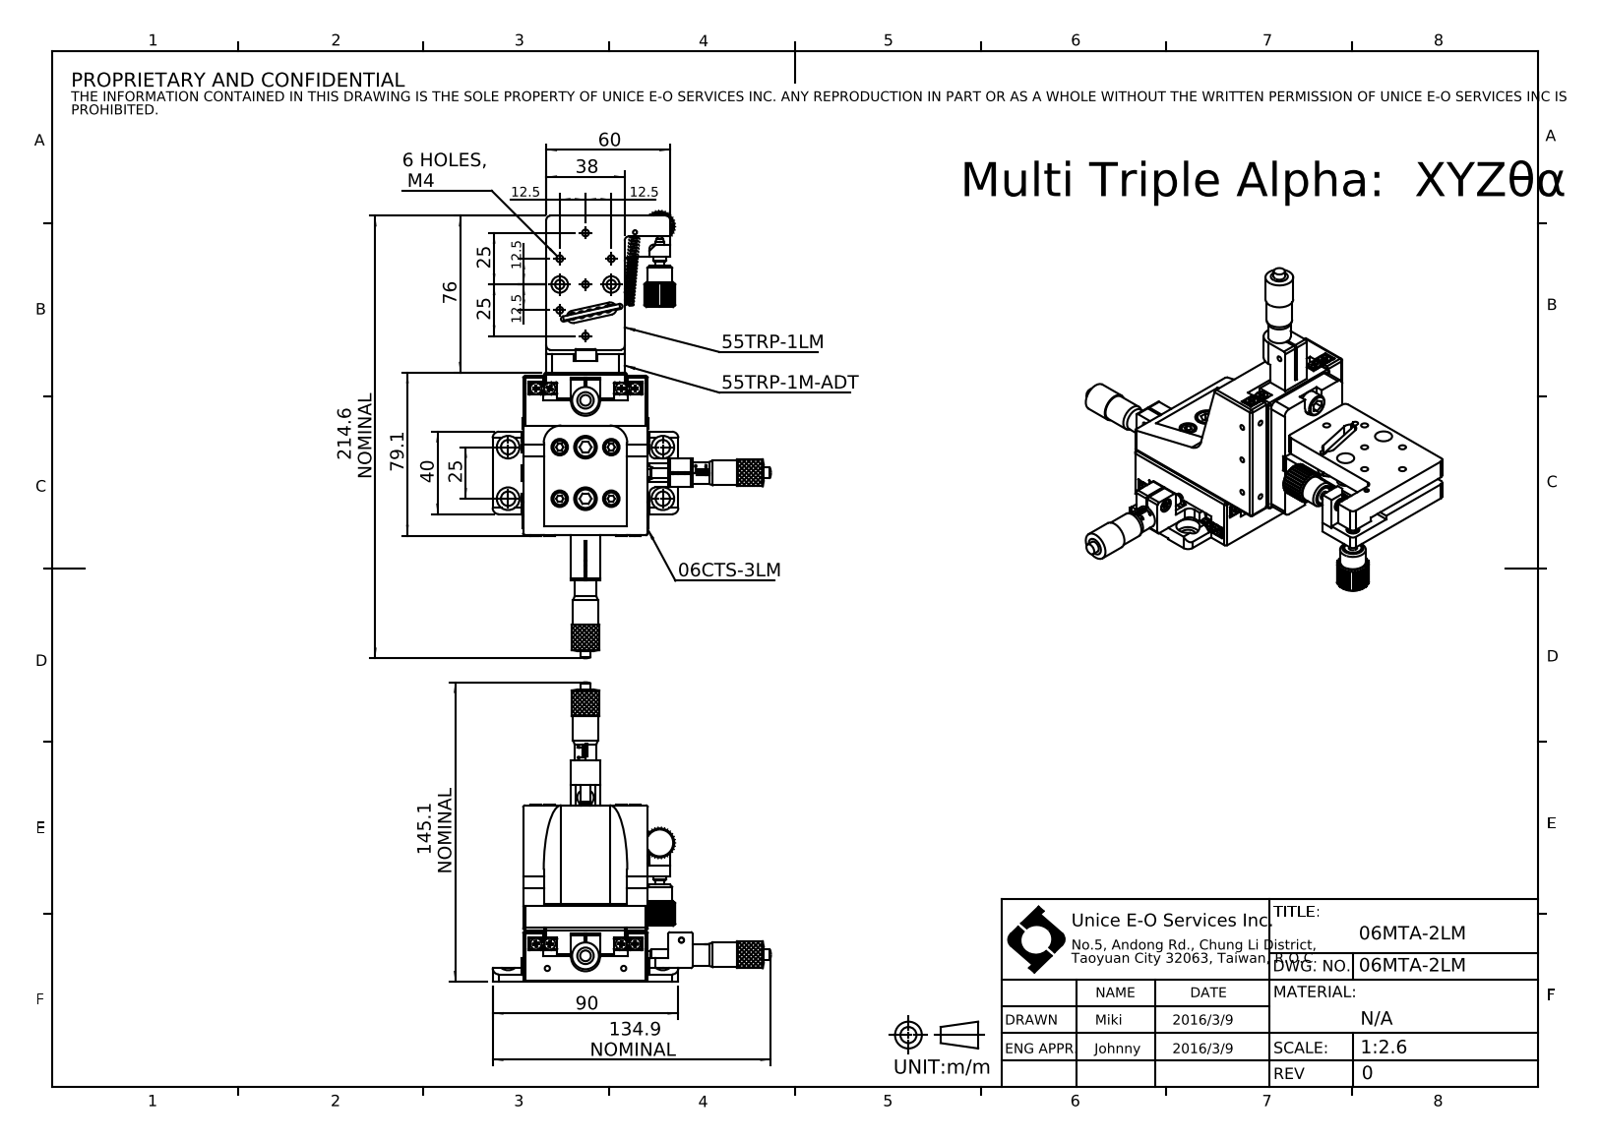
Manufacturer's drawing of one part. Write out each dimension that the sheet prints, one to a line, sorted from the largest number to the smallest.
214.6 NOMINAL
145.1 NOMINAL
134.9 NOMINAL
90
79.1
76
60
40
38
25
25
25
12.5
12.5
12.5
12.5
6 HOLES, M4
